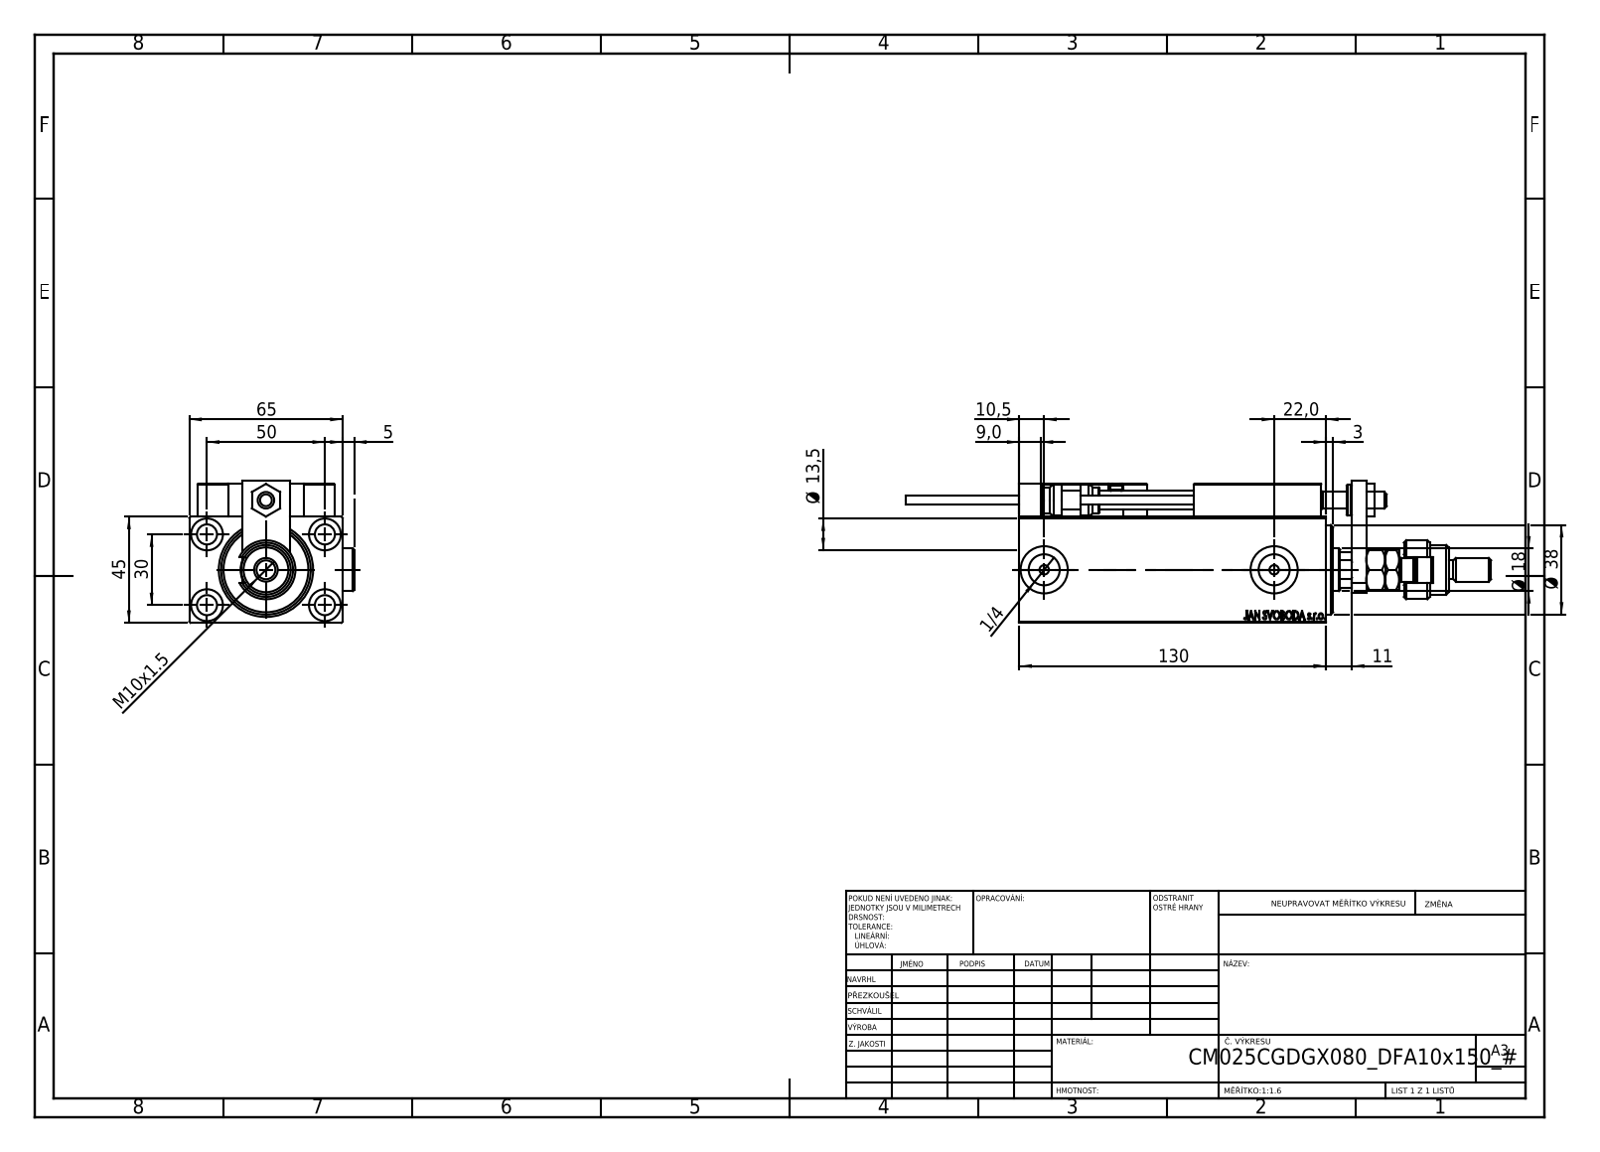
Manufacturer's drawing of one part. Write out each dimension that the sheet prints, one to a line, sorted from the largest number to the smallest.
130
65
50
45
Ø 38
30
22,0
Ø 18
Ø 13,5
11
10,5
M10x1.5
9,0
5
3
1/4
